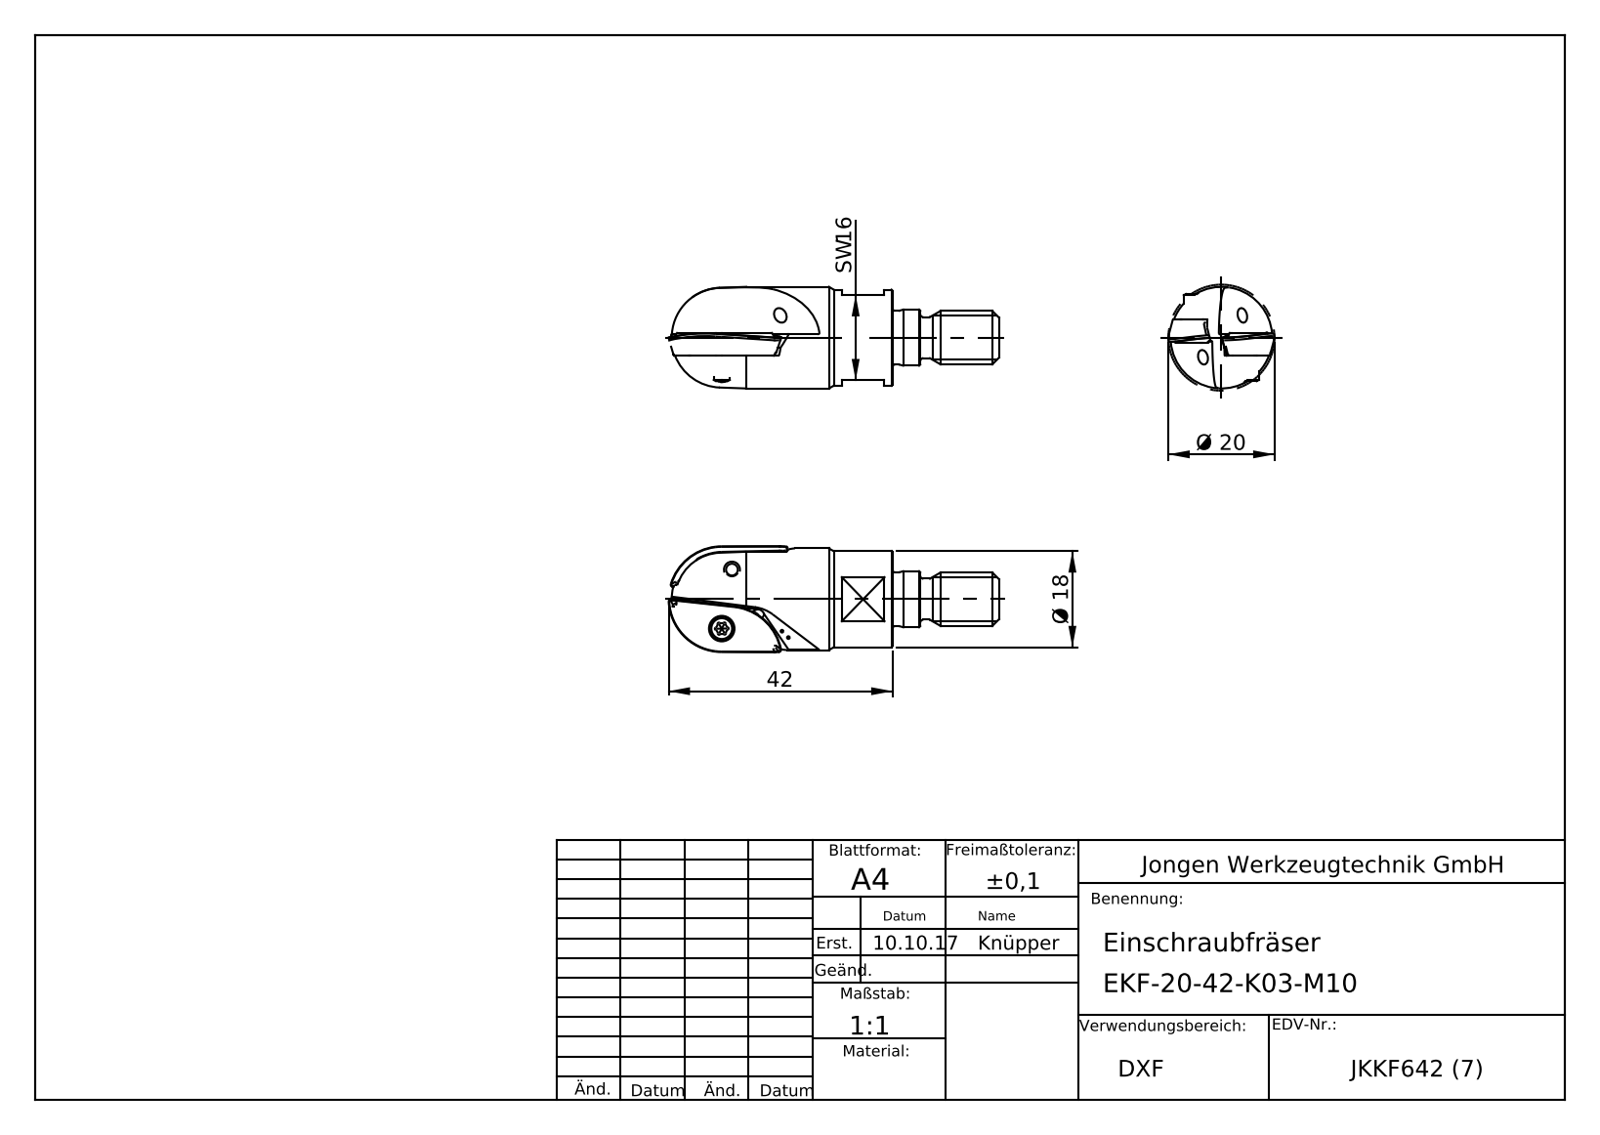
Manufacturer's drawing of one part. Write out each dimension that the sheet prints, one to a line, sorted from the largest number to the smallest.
42
Ø 20
Ø 18
SW 16
